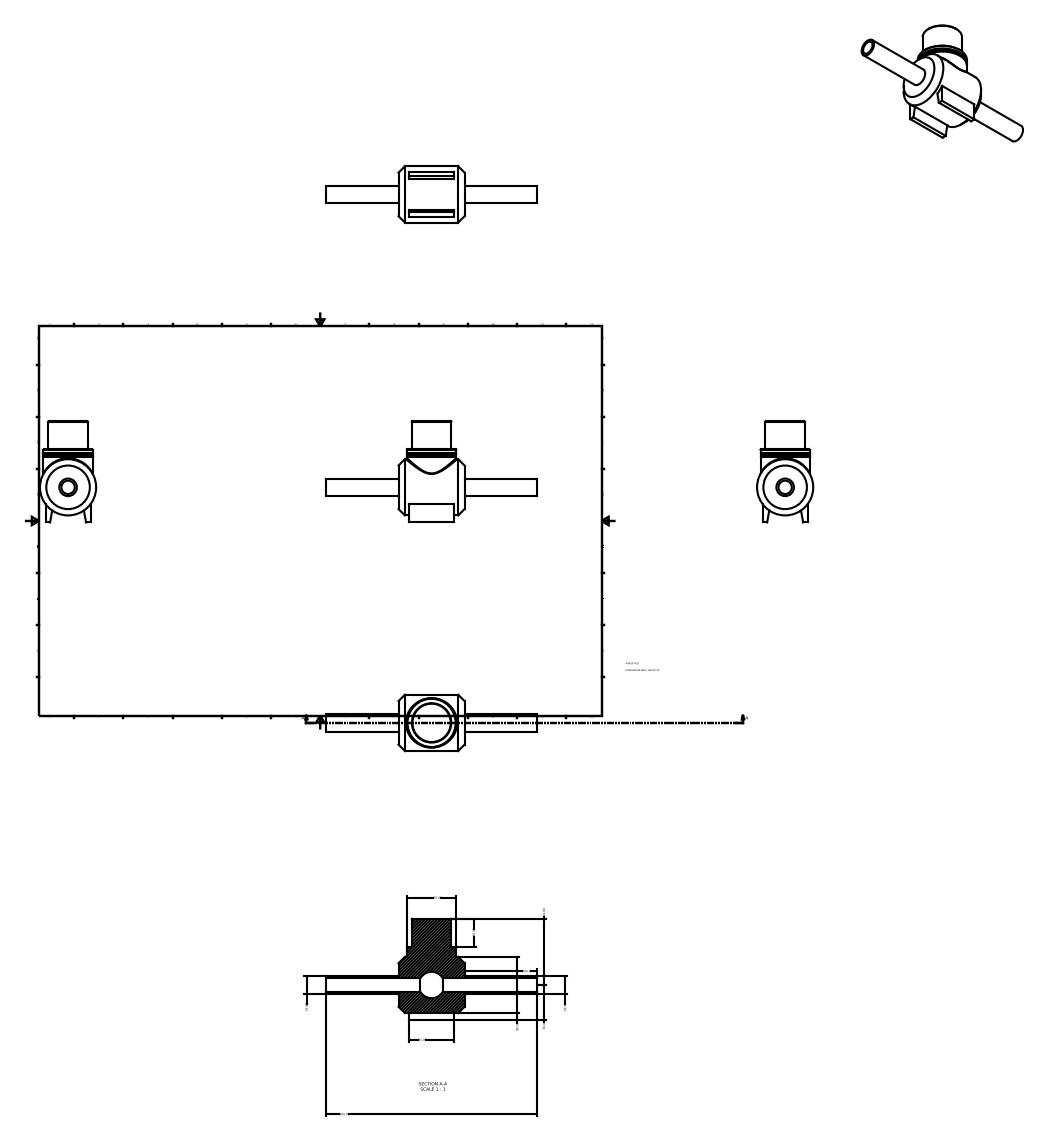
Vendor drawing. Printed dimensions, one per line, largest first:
300.00
103.00
94.00
80.00
70.00
65.00
50.00
40.00
25.00
25.00
